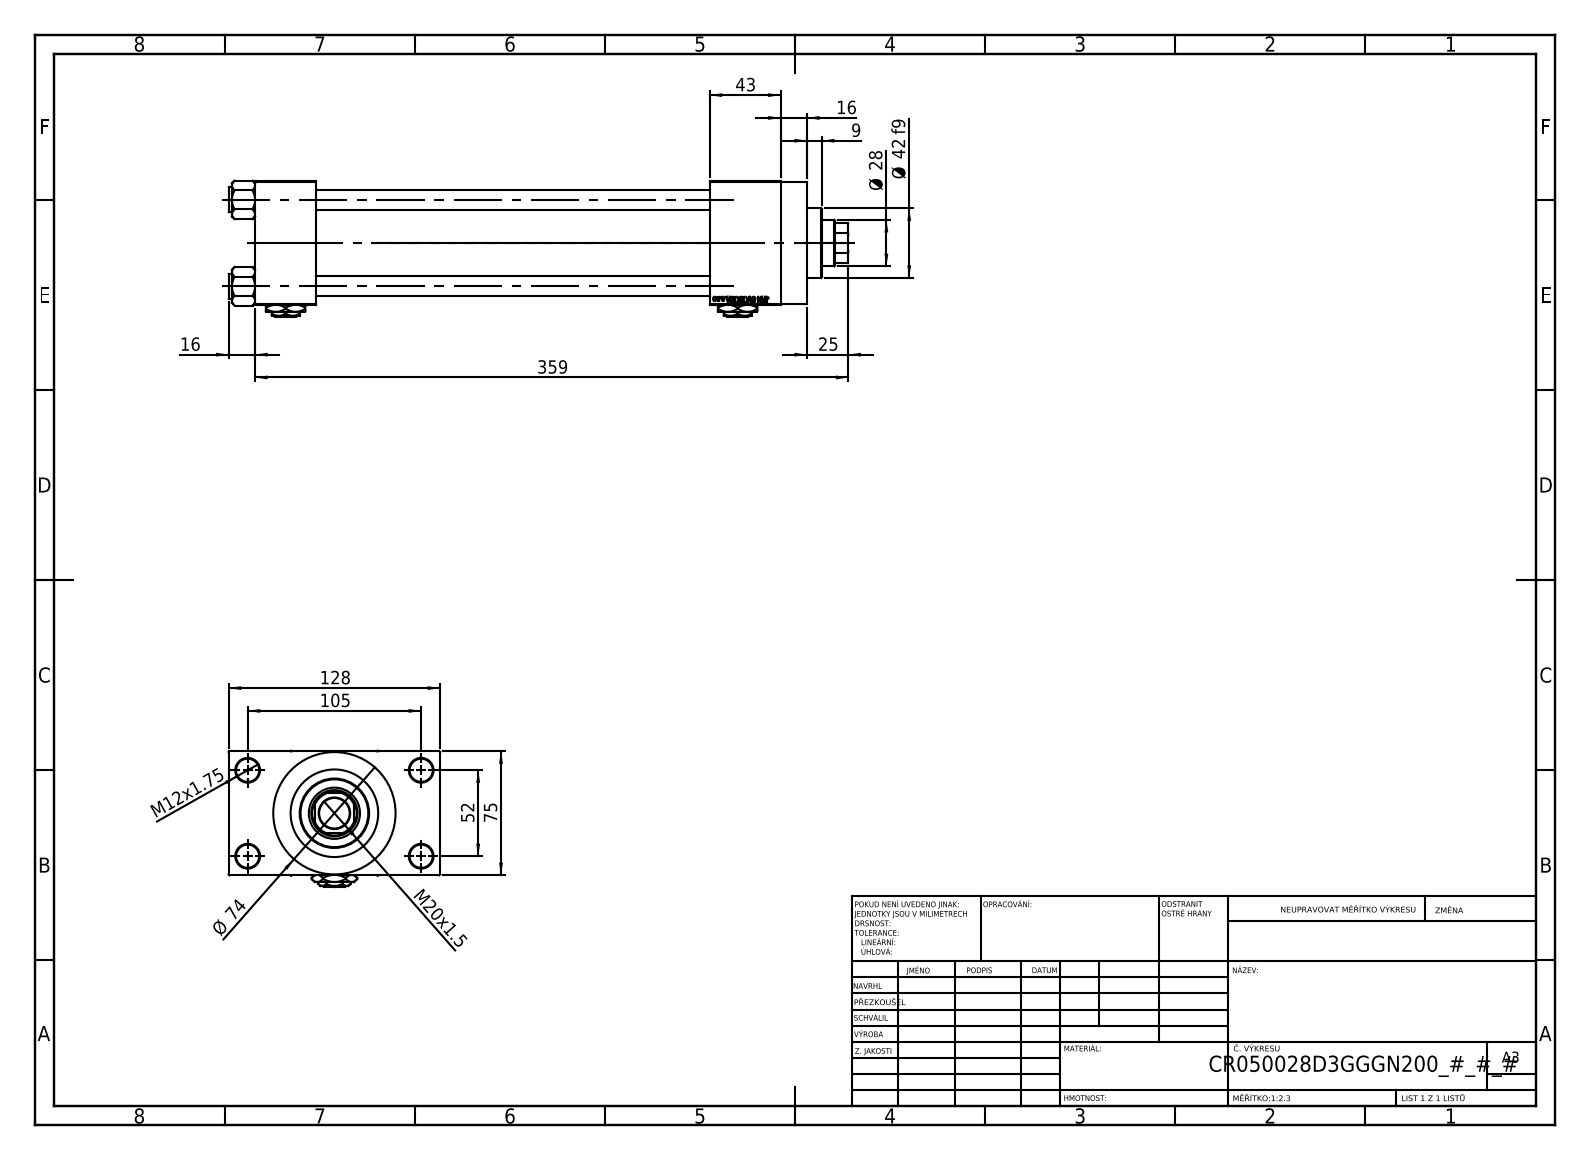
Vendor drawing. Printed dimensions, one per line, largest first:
359
128
105
75
Ø 74
52
43
Ø 42 f9
Ø 28
25
M20x1.5
16
16
M12x1.75
9
